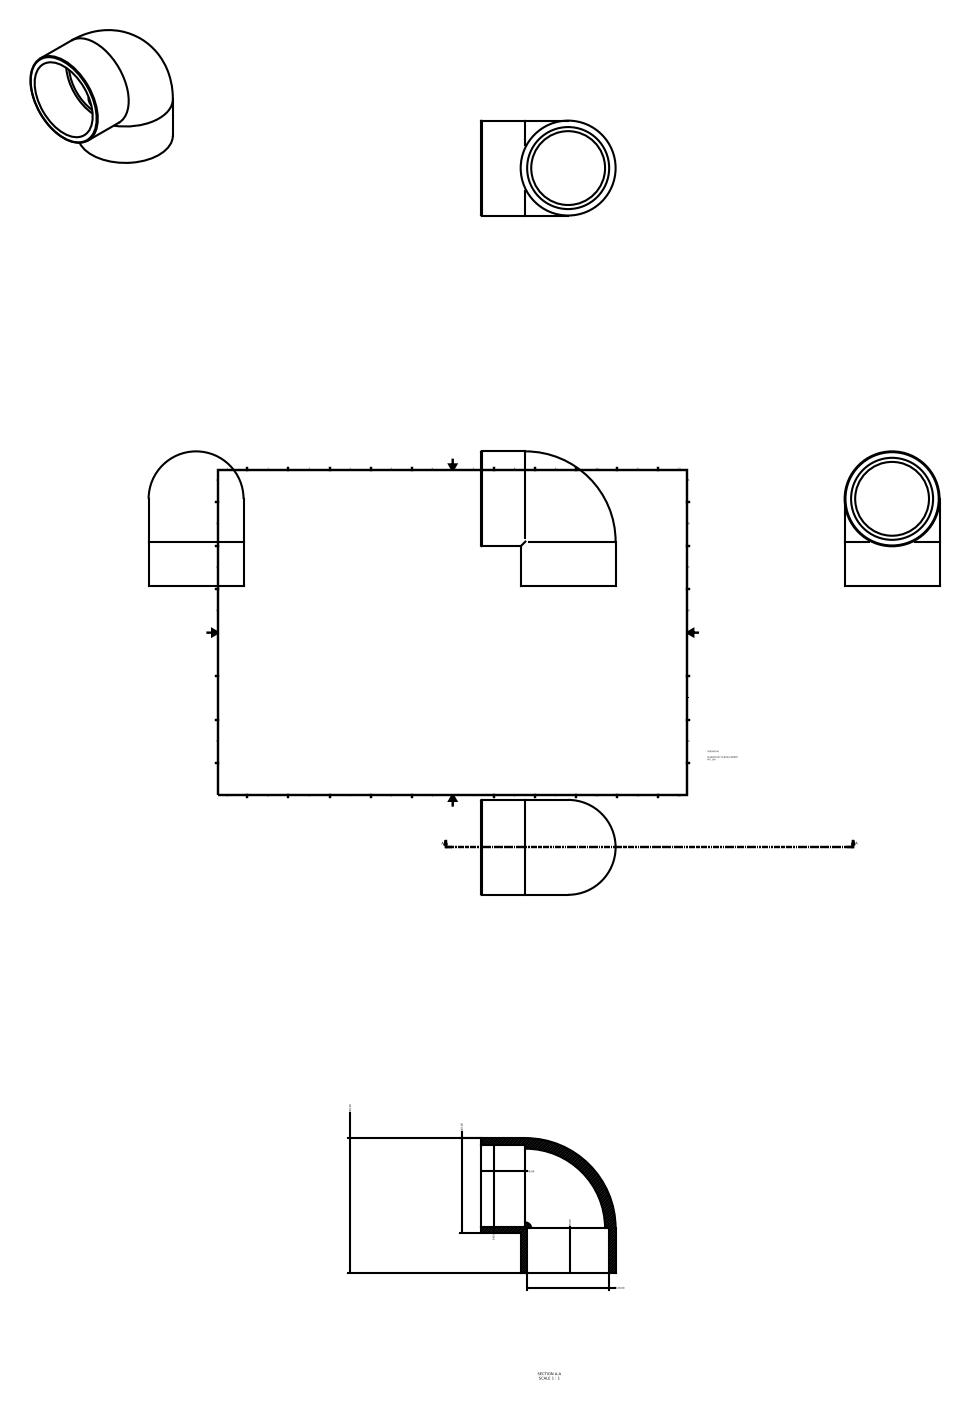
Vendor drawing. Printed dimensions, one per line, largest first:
230.00
162.00
140.00
140.00
76.00
76.00
